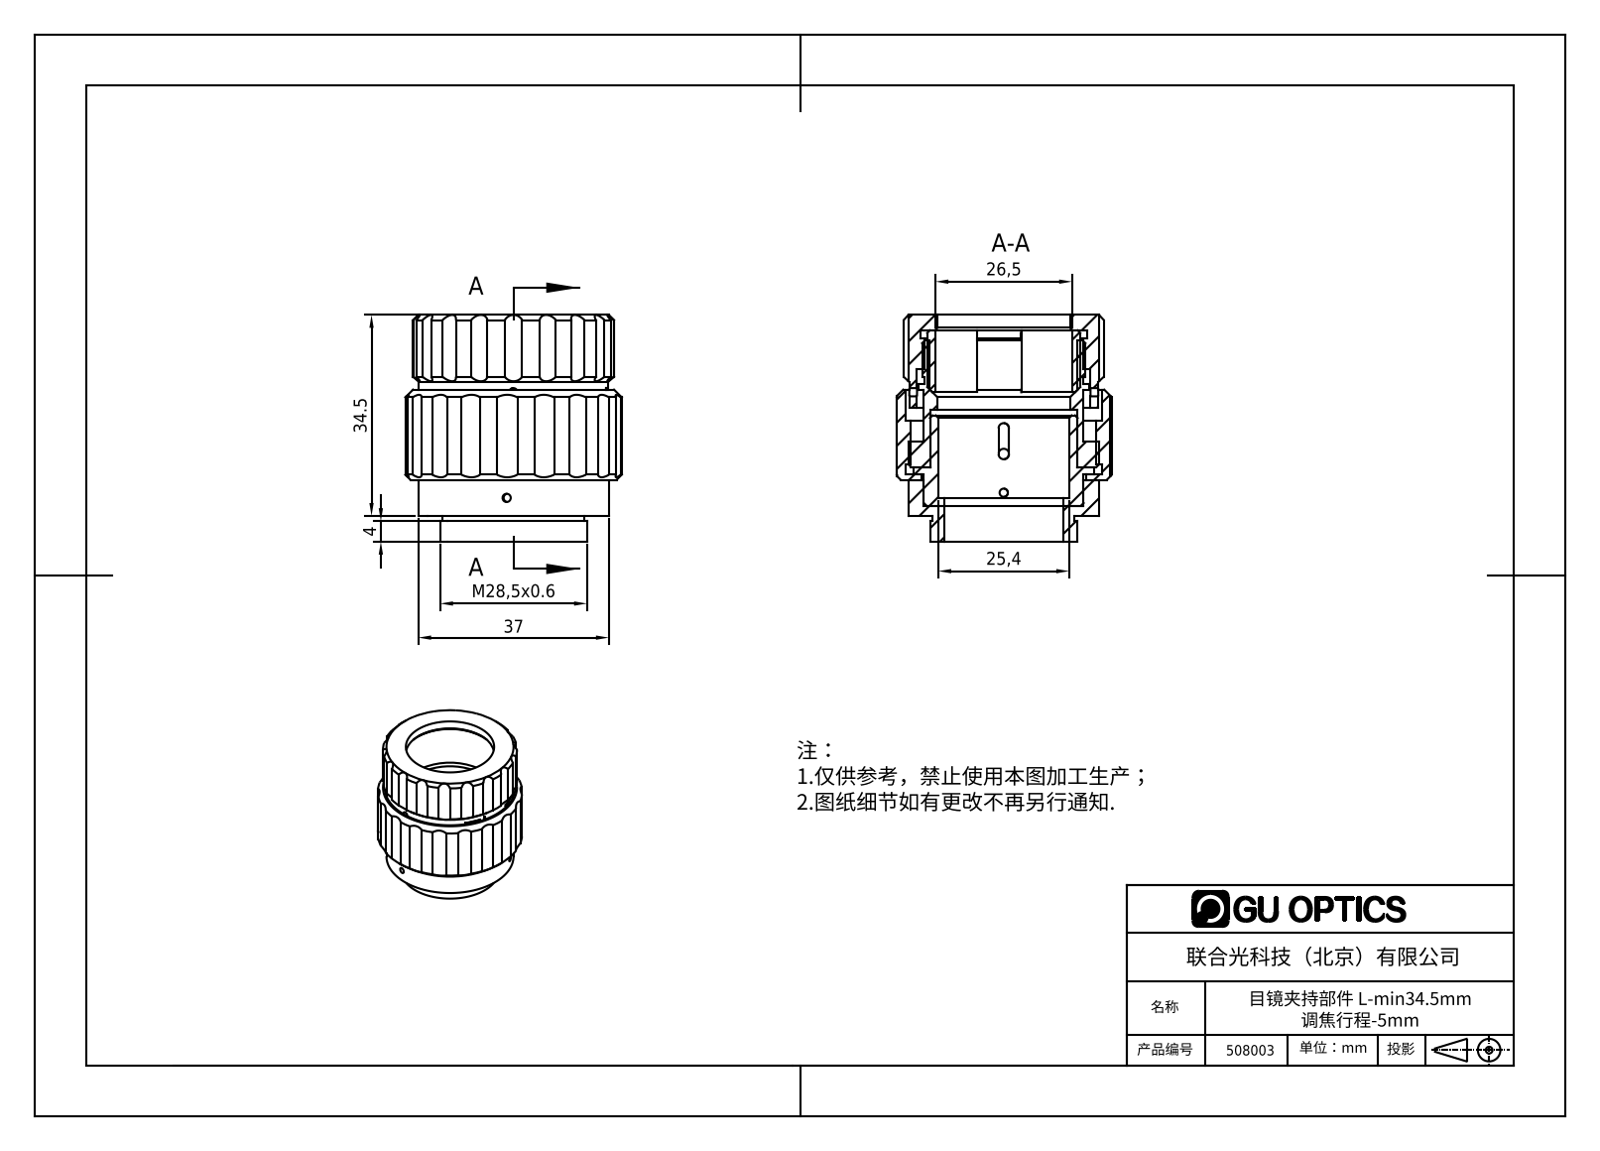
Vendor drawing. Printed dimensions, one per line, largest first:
37
34.5
M28,5x0.6
26,5
25,4
4
